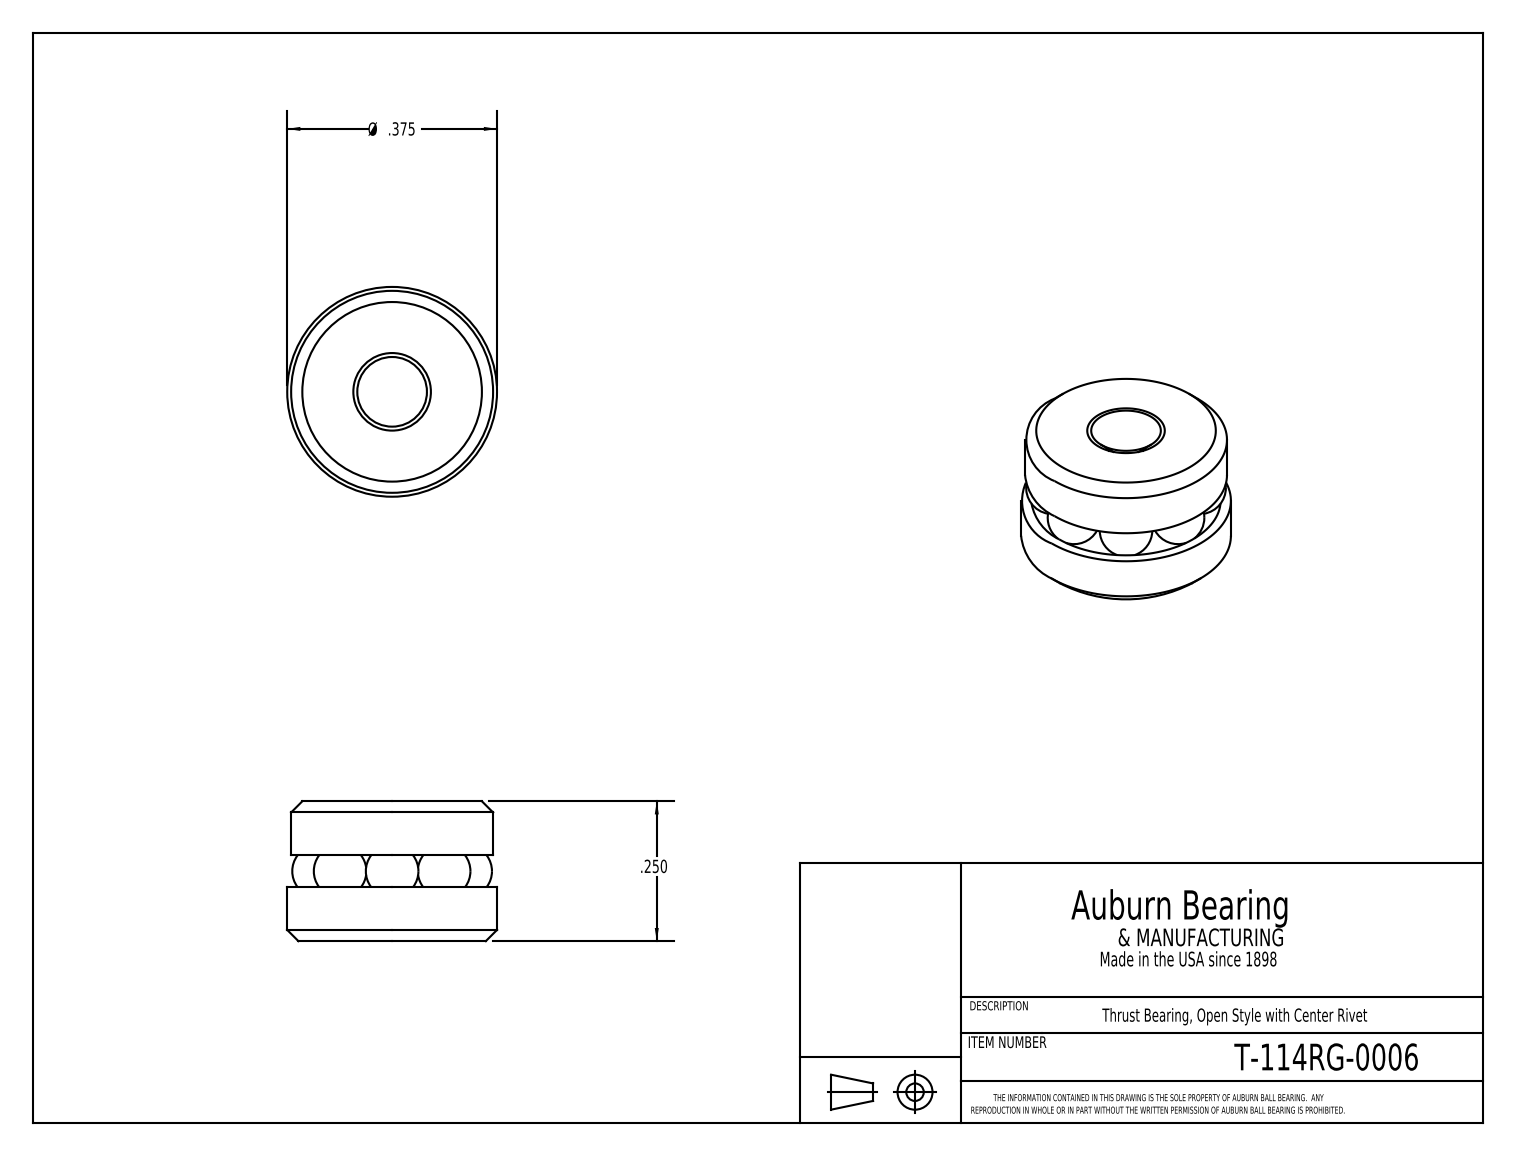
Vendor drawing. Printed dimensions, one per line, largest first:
Ø .375
.250
